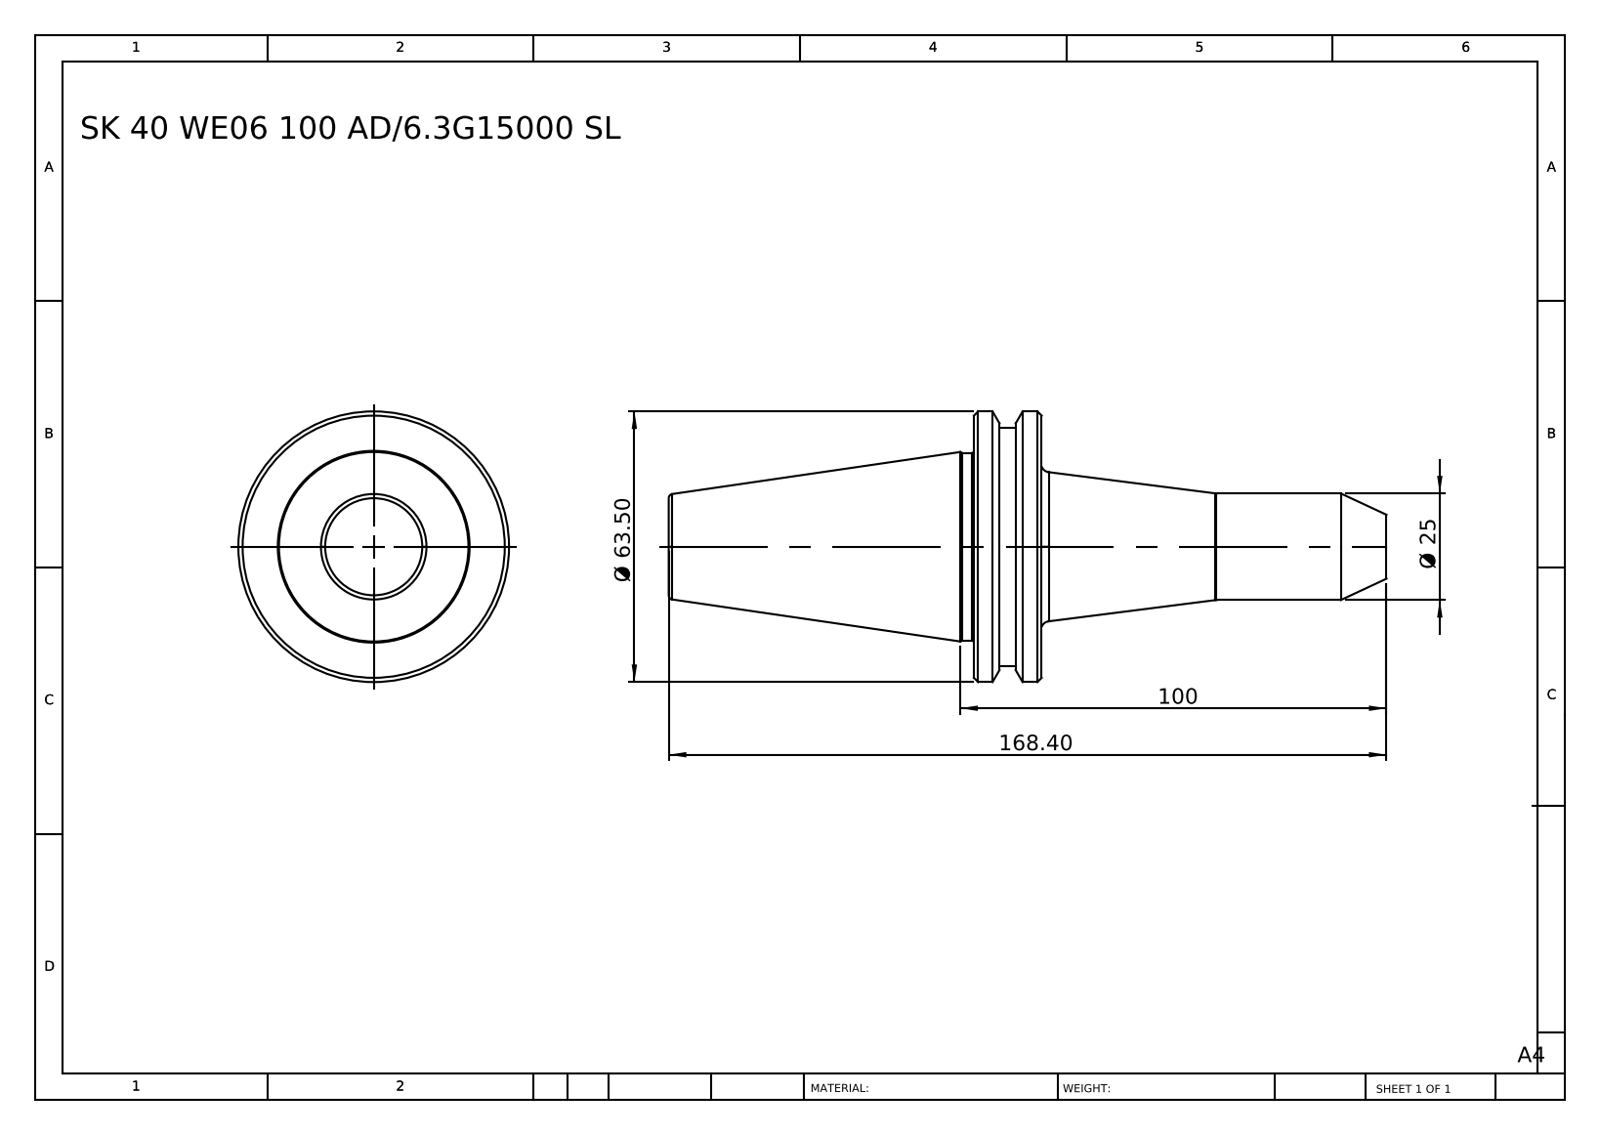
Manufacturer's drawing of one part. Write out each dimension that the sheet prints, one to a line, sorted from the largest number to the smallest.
168.40
100
Ø 63.50
Ø 25
